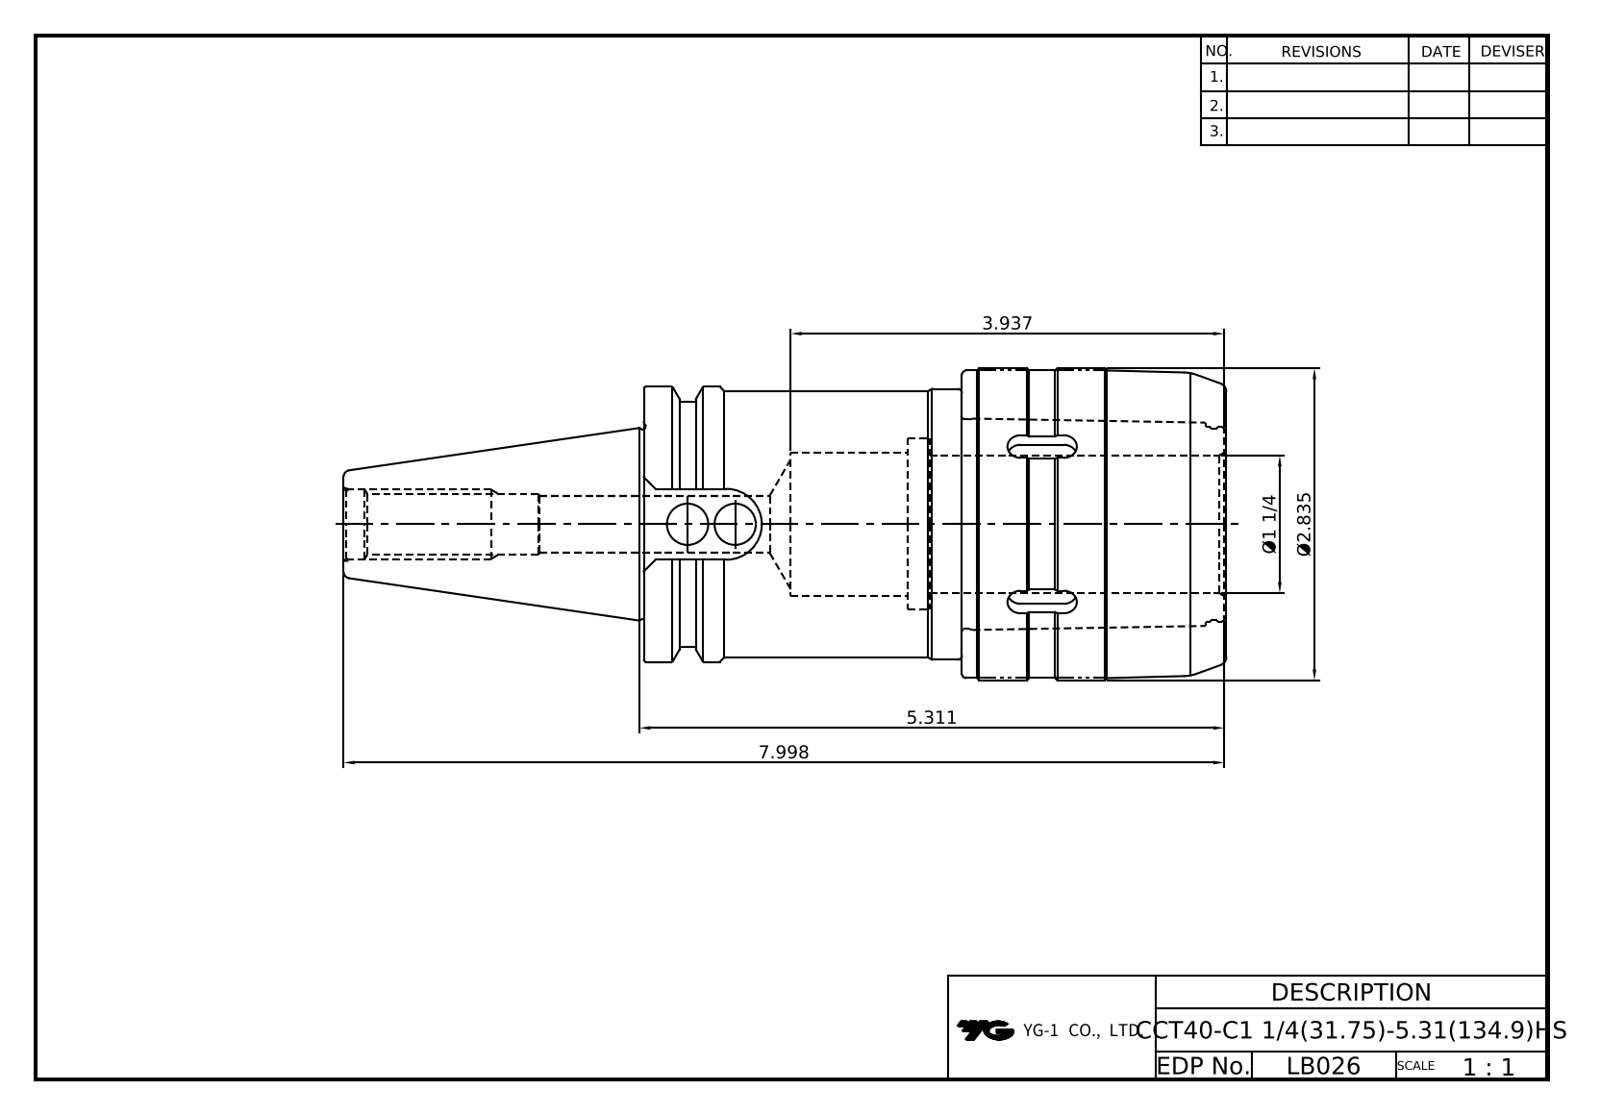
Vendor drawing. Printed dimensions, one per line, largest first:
7.998
5.311
3.937
Ø2.835
Ø1 1/4
